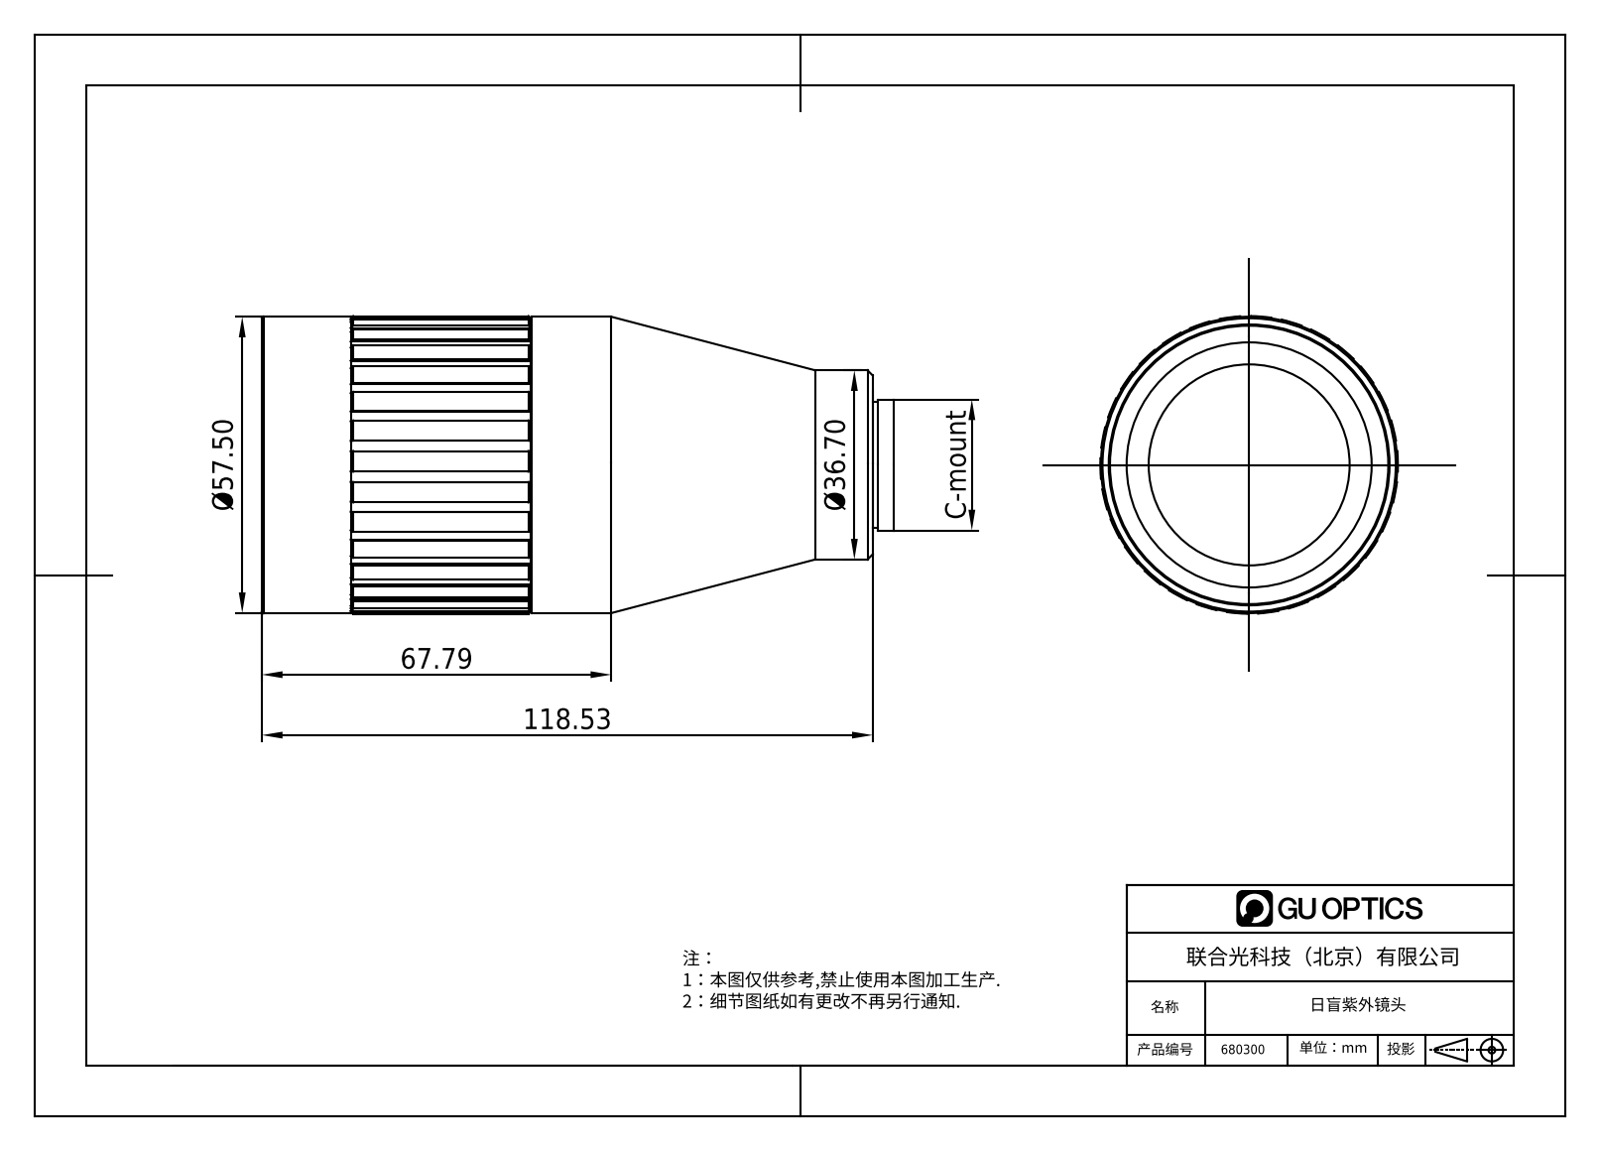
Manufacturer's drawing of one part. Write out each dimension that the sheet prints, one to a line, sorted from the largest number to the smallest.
118.53
67.79
Ø57.50
Ø36.70
C-mount
